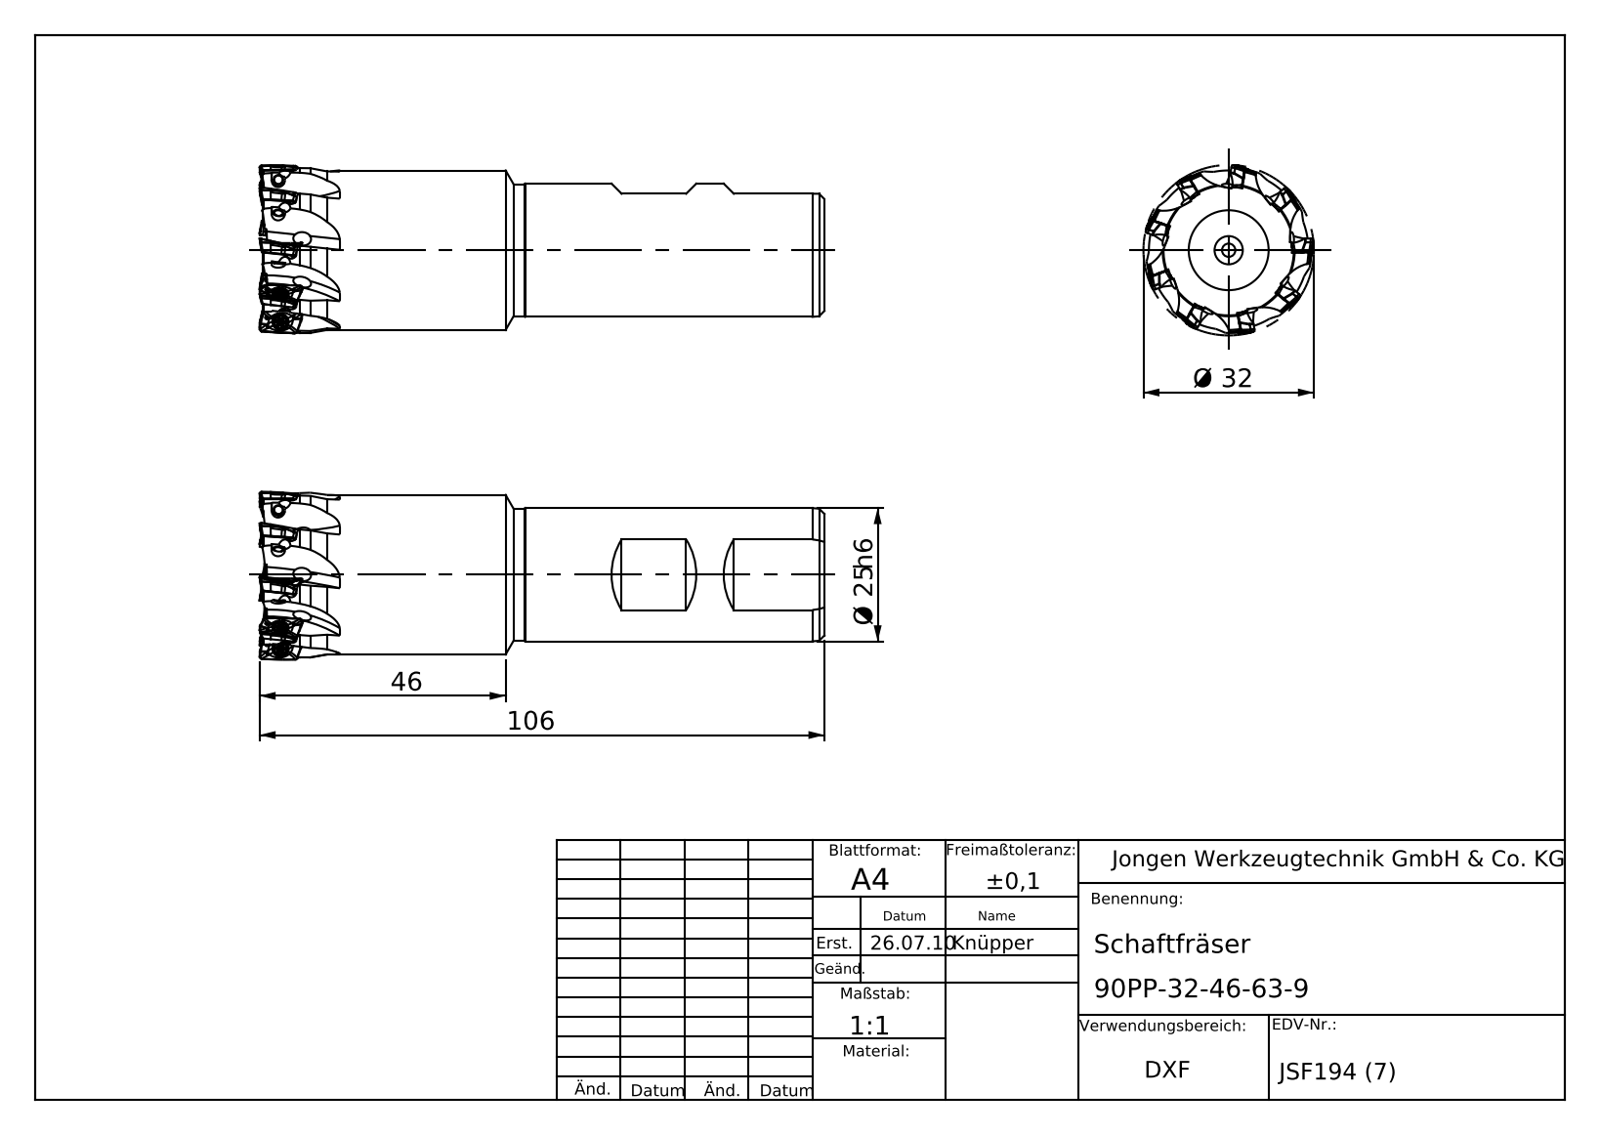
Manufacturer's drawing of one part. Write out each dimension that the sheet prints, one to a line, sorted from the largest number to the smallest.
106
46
Ø 32
Ø 25 h6
